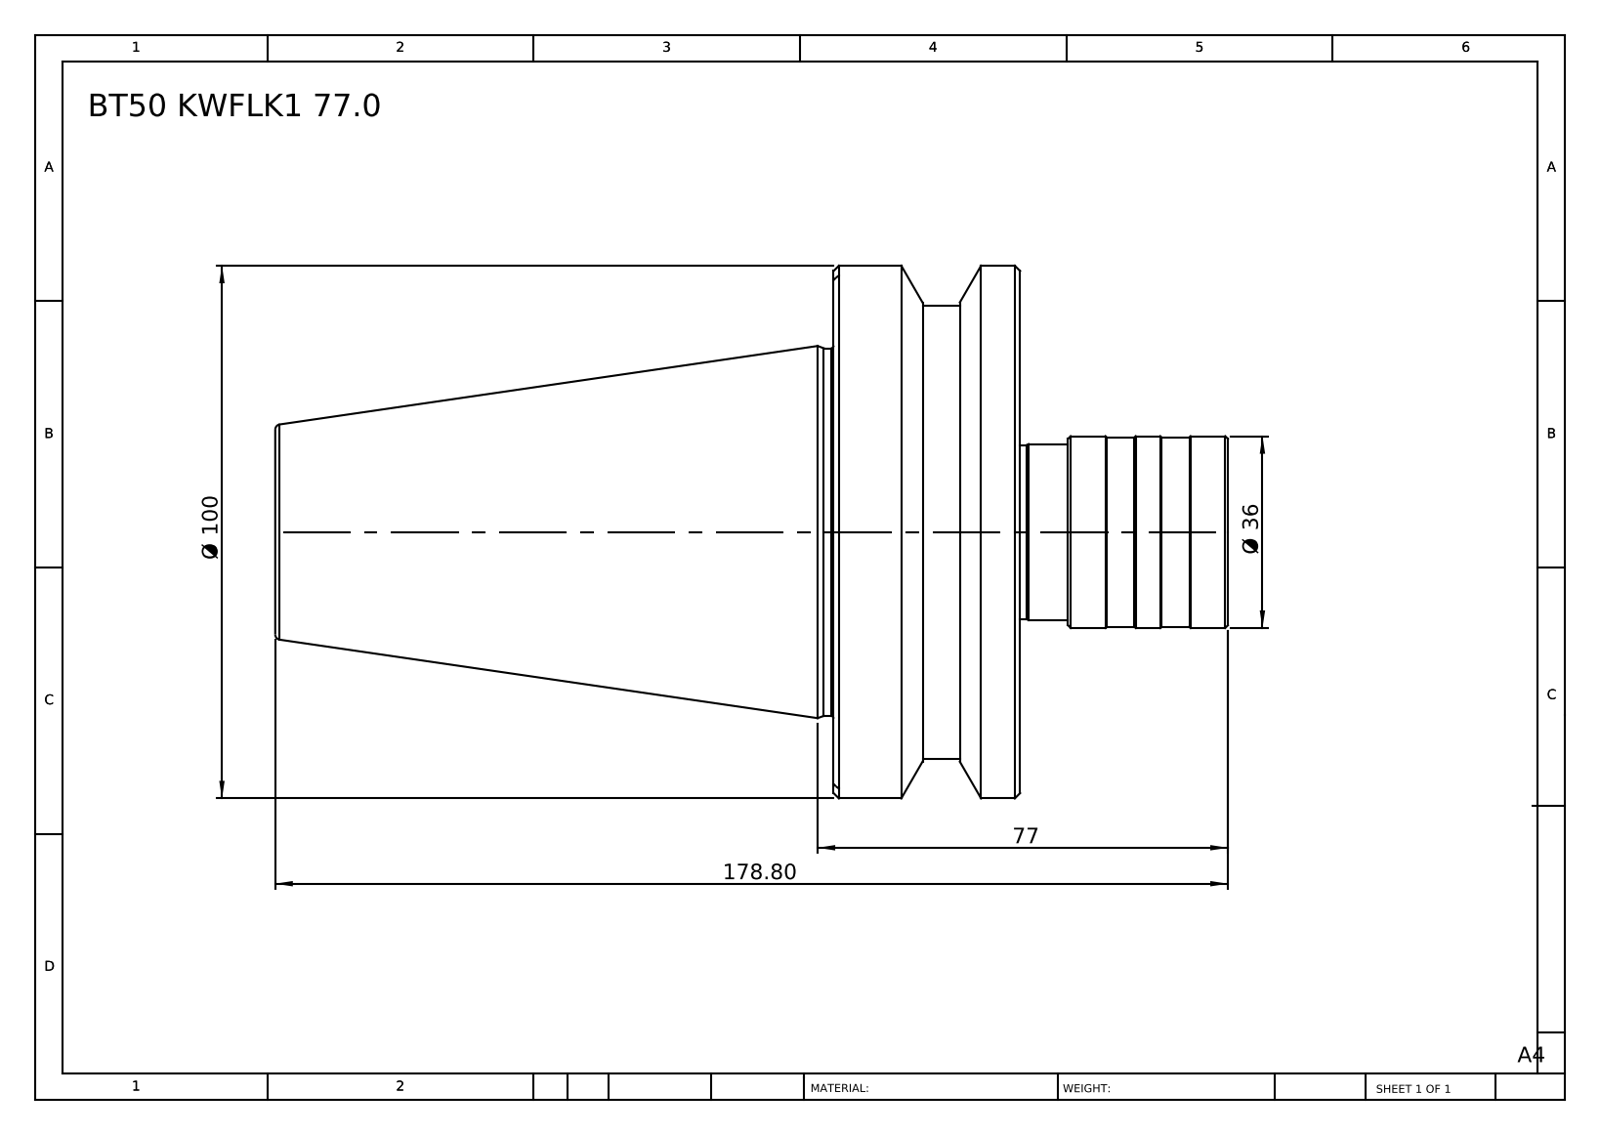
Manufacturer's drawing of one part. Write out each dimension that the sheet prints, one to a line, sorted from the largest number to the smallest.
178.80
Ø 100
77
Ø 36
